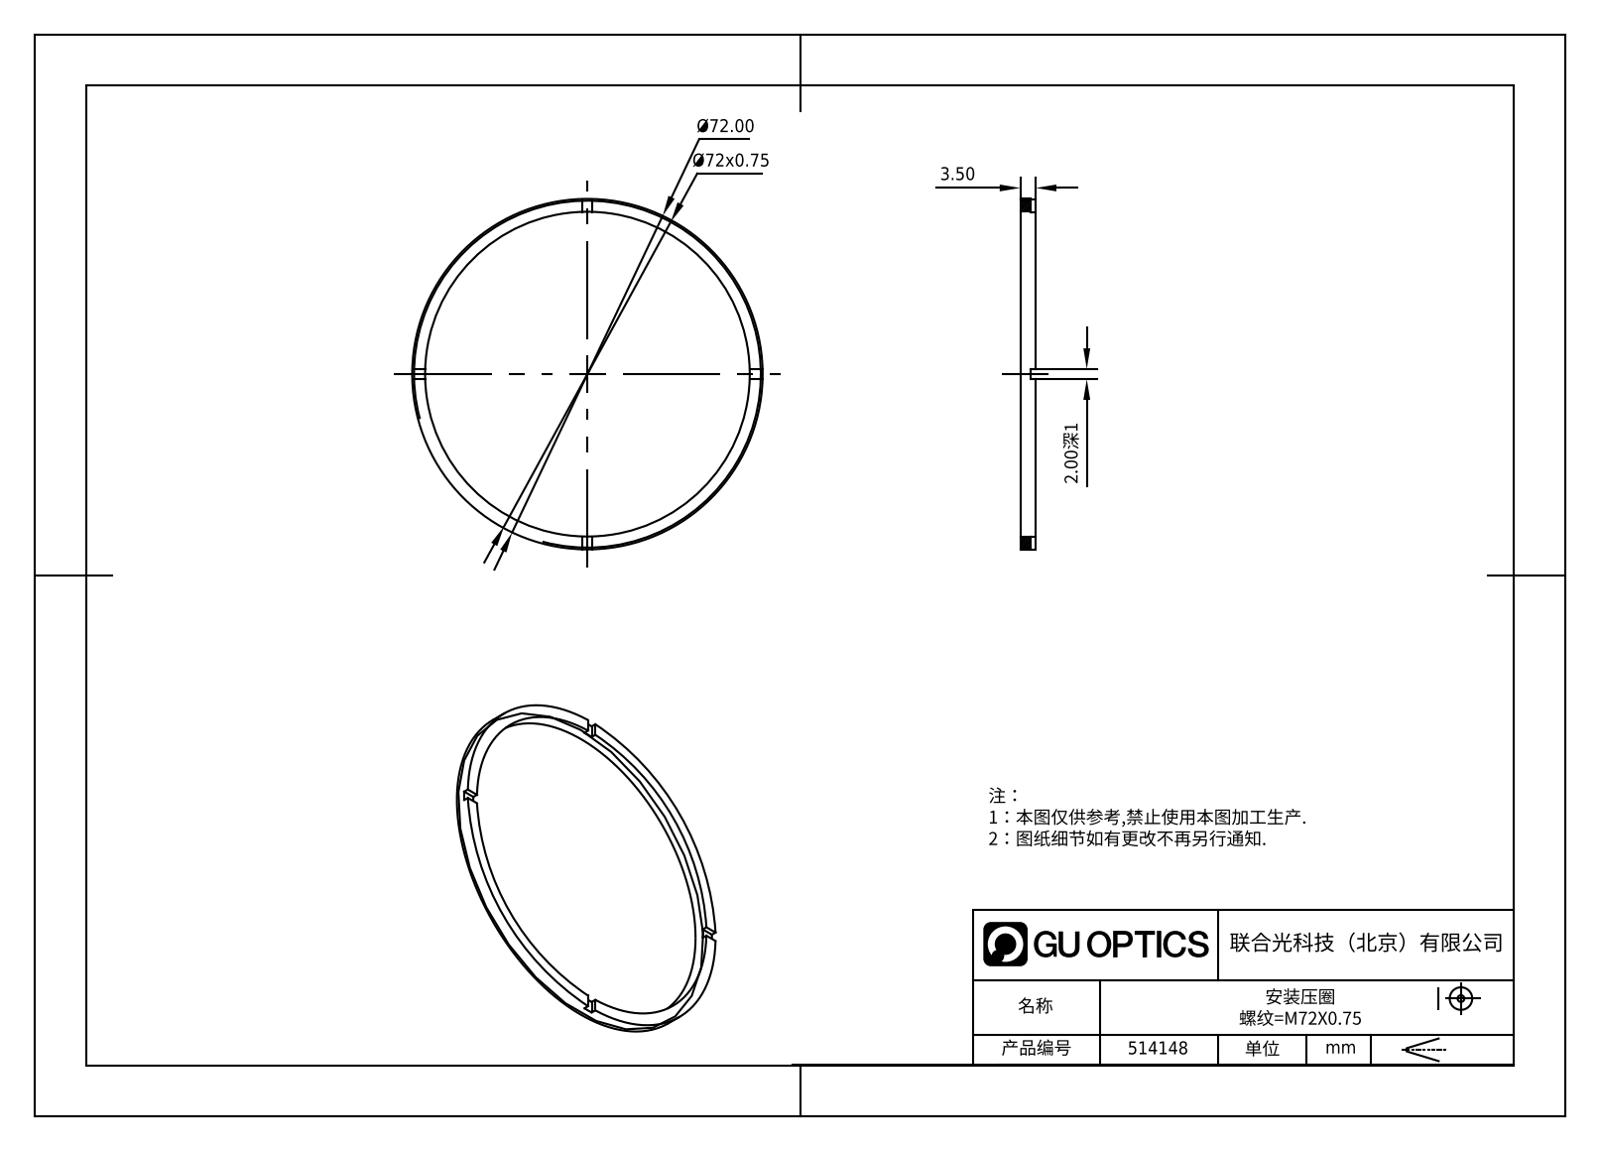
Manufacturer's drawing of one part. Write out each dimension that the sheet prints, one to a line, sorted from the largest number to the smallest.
Ø72.00
Ø72x0.75
3.50
2.00深1
